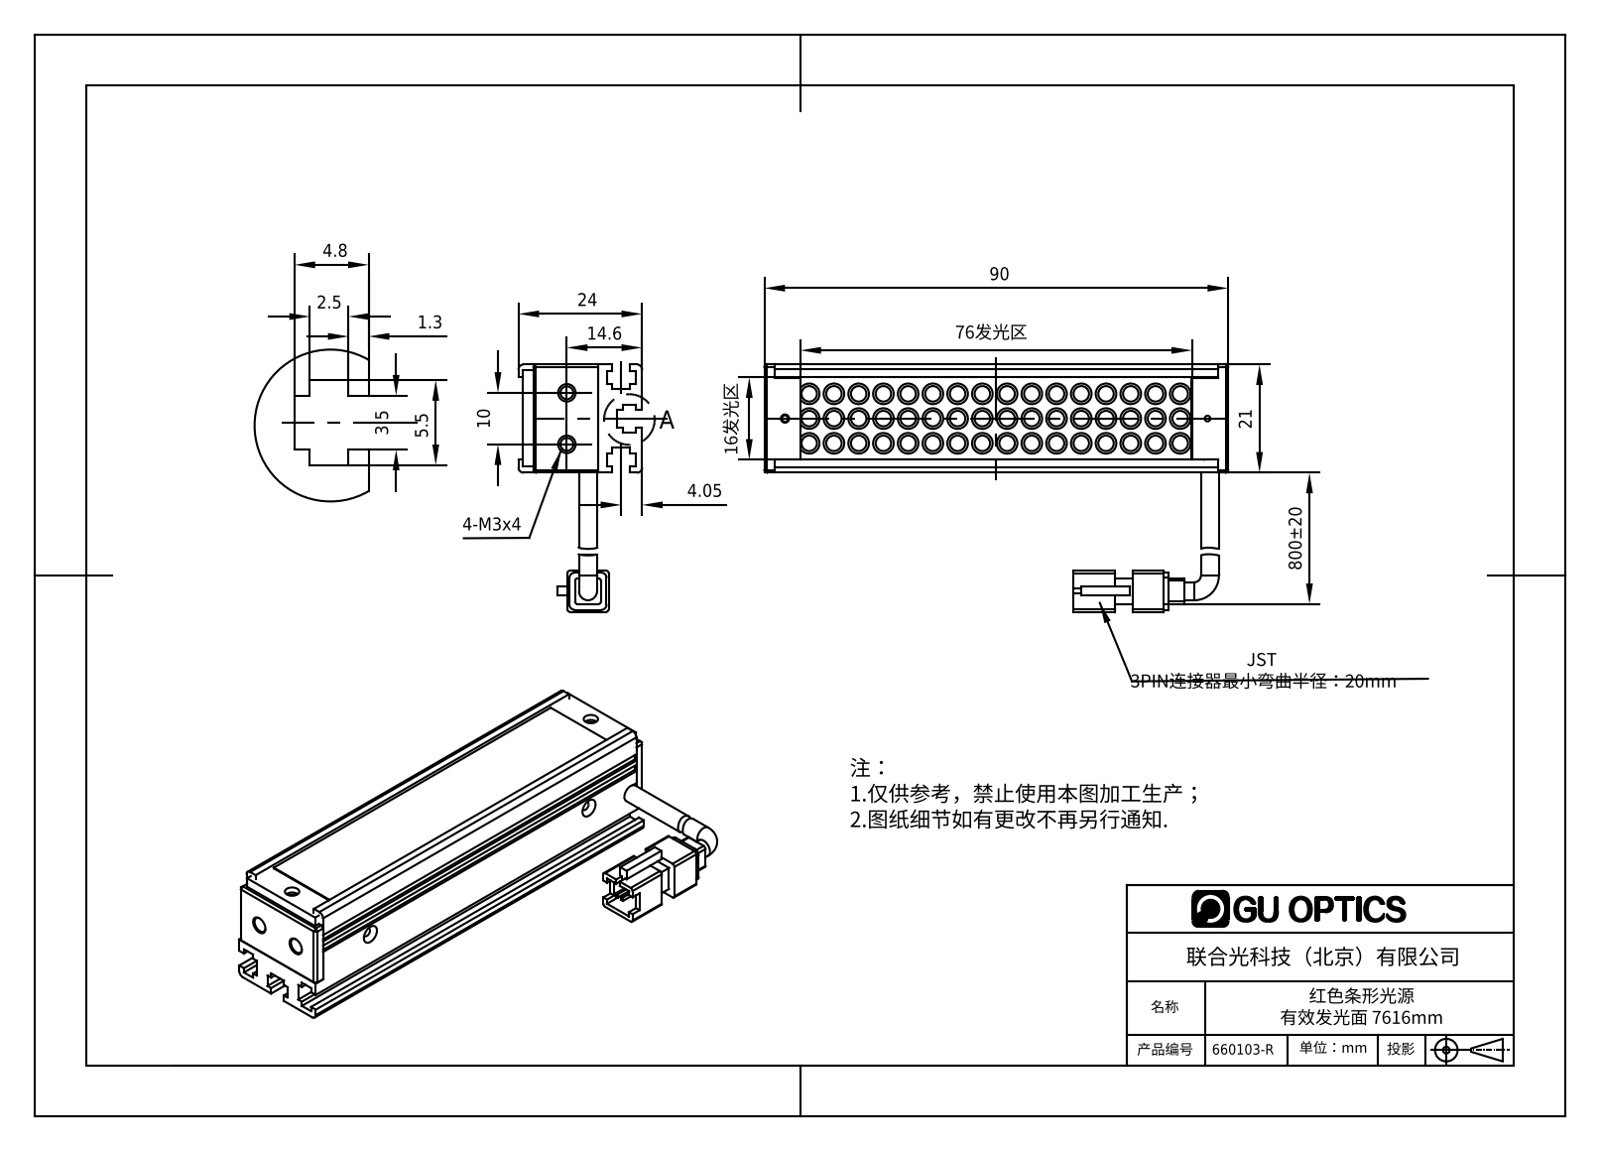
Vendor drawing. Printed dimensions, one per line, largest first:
800±20
90
76发光区
24
21
16发光区
14.6
10
5.5
4.8
4.05
3.5
2.5
1.3
